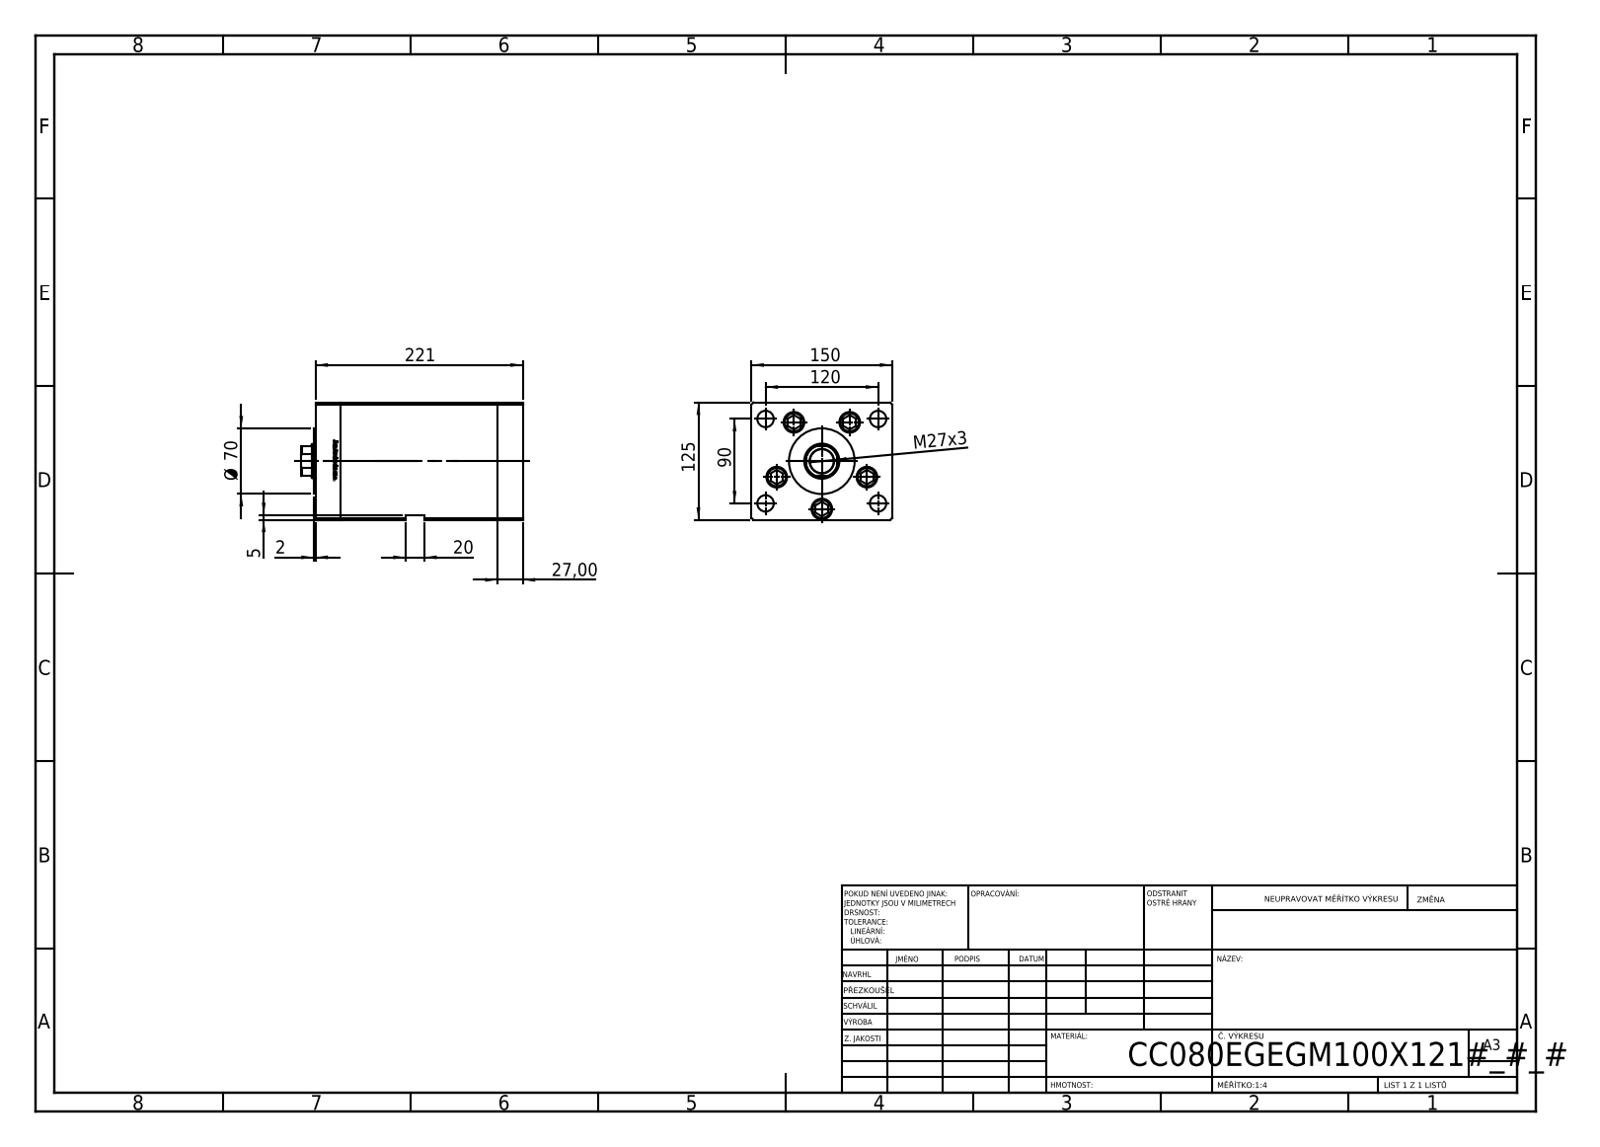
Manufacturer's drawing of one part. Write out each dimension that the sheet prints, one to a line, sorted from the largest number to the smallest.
221
150
125
120
90
Ø 70
27,00
M27x3
20
5
2
